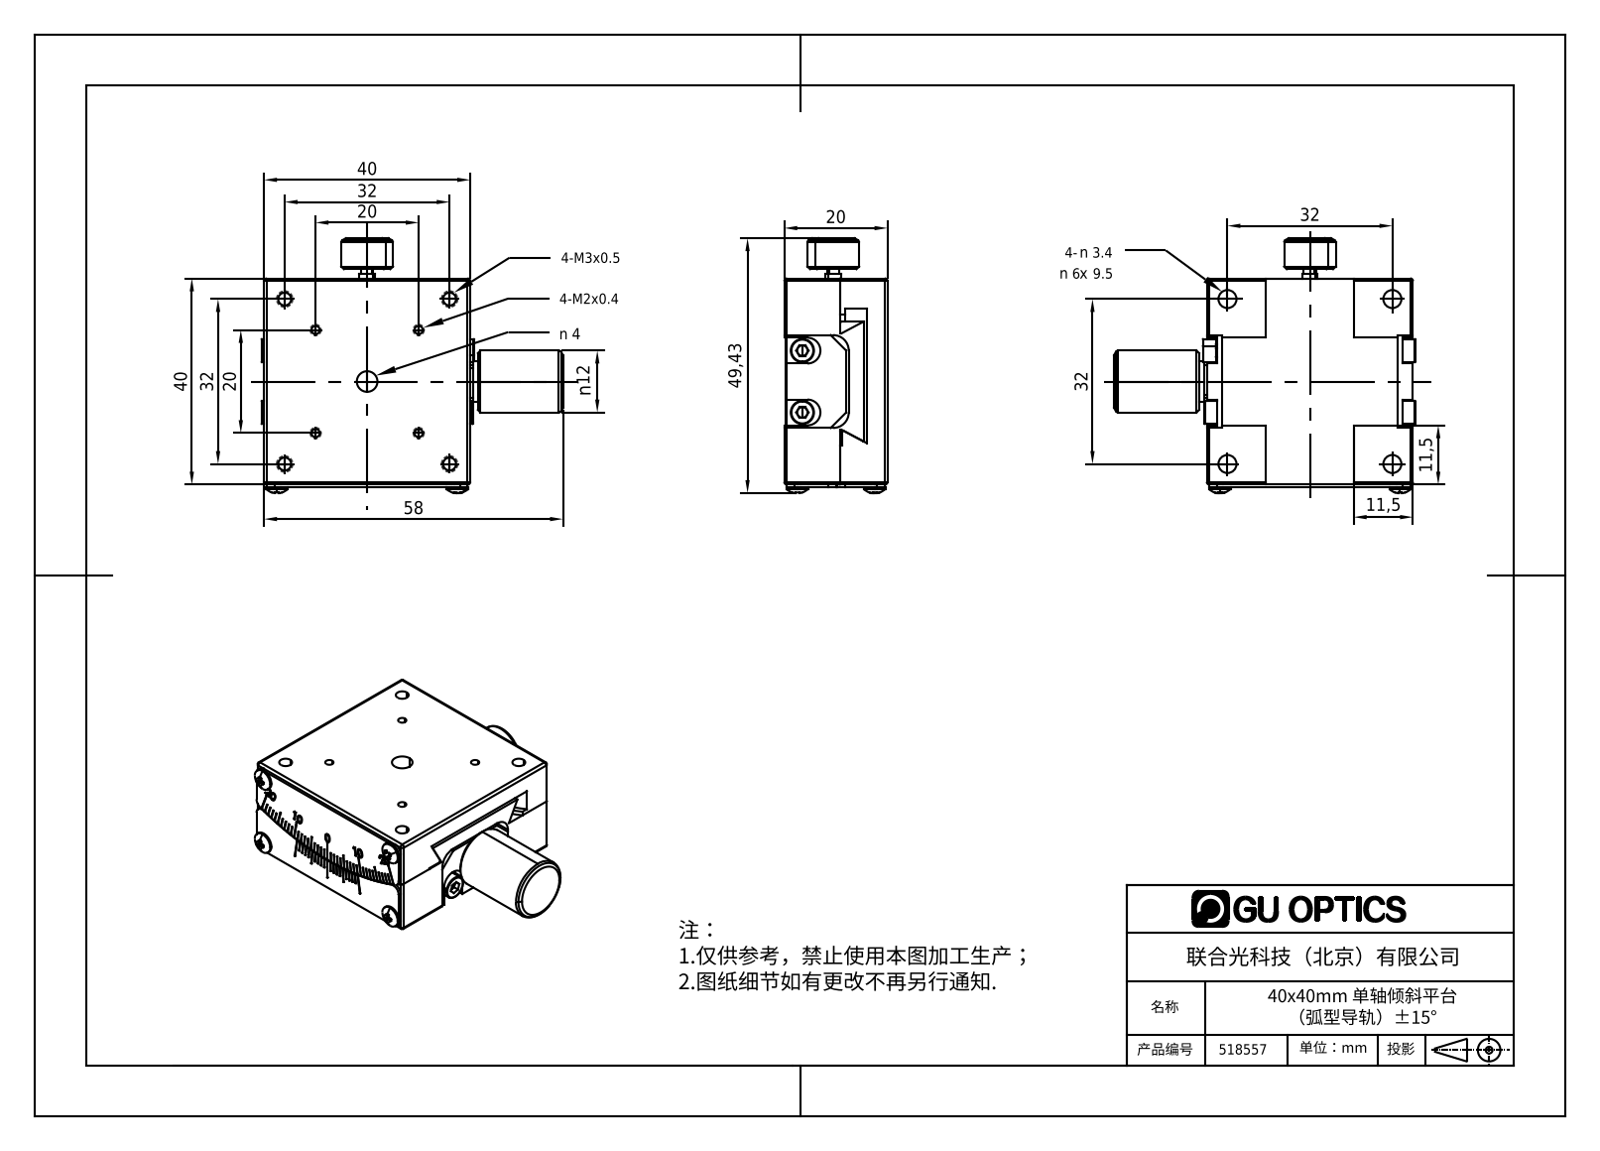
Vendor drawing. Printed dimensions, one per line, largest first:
58
49,43
40
40
32
32
32
32
20
20
20
n12
11,5
11,5
